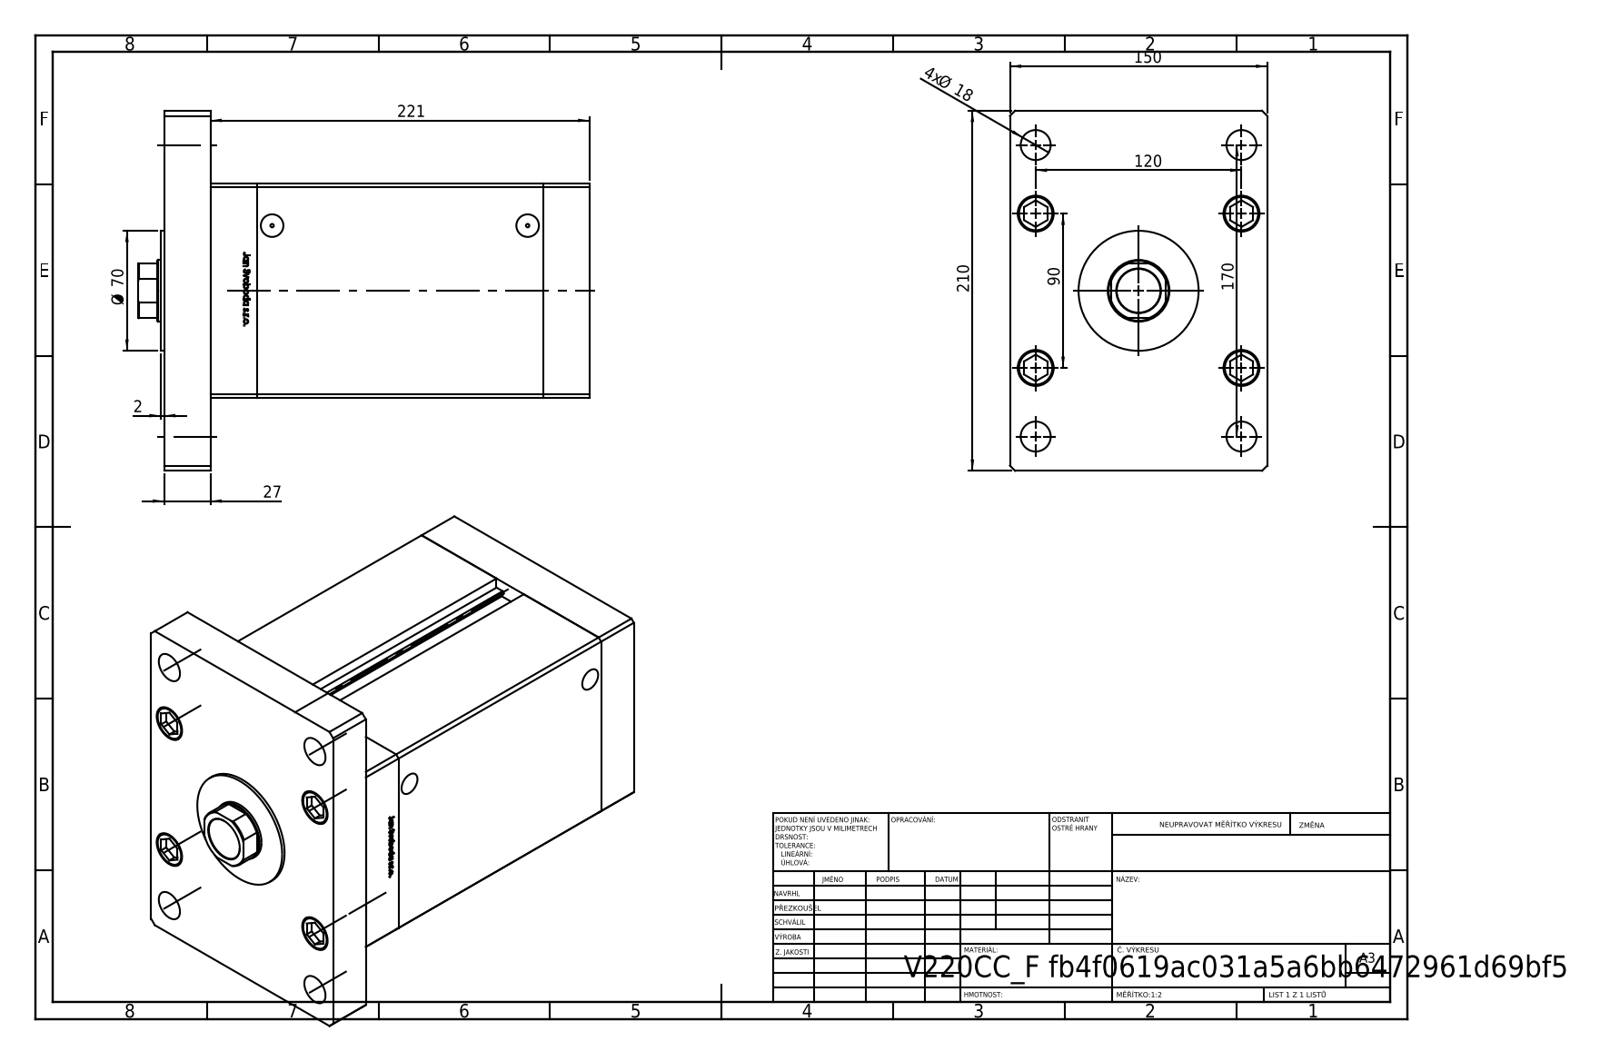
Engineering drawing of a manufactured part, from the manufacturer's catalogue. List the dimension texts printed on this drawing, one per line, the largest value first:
221
210
170
150
120
90
Ø 70
27
4x Ø 18
2
